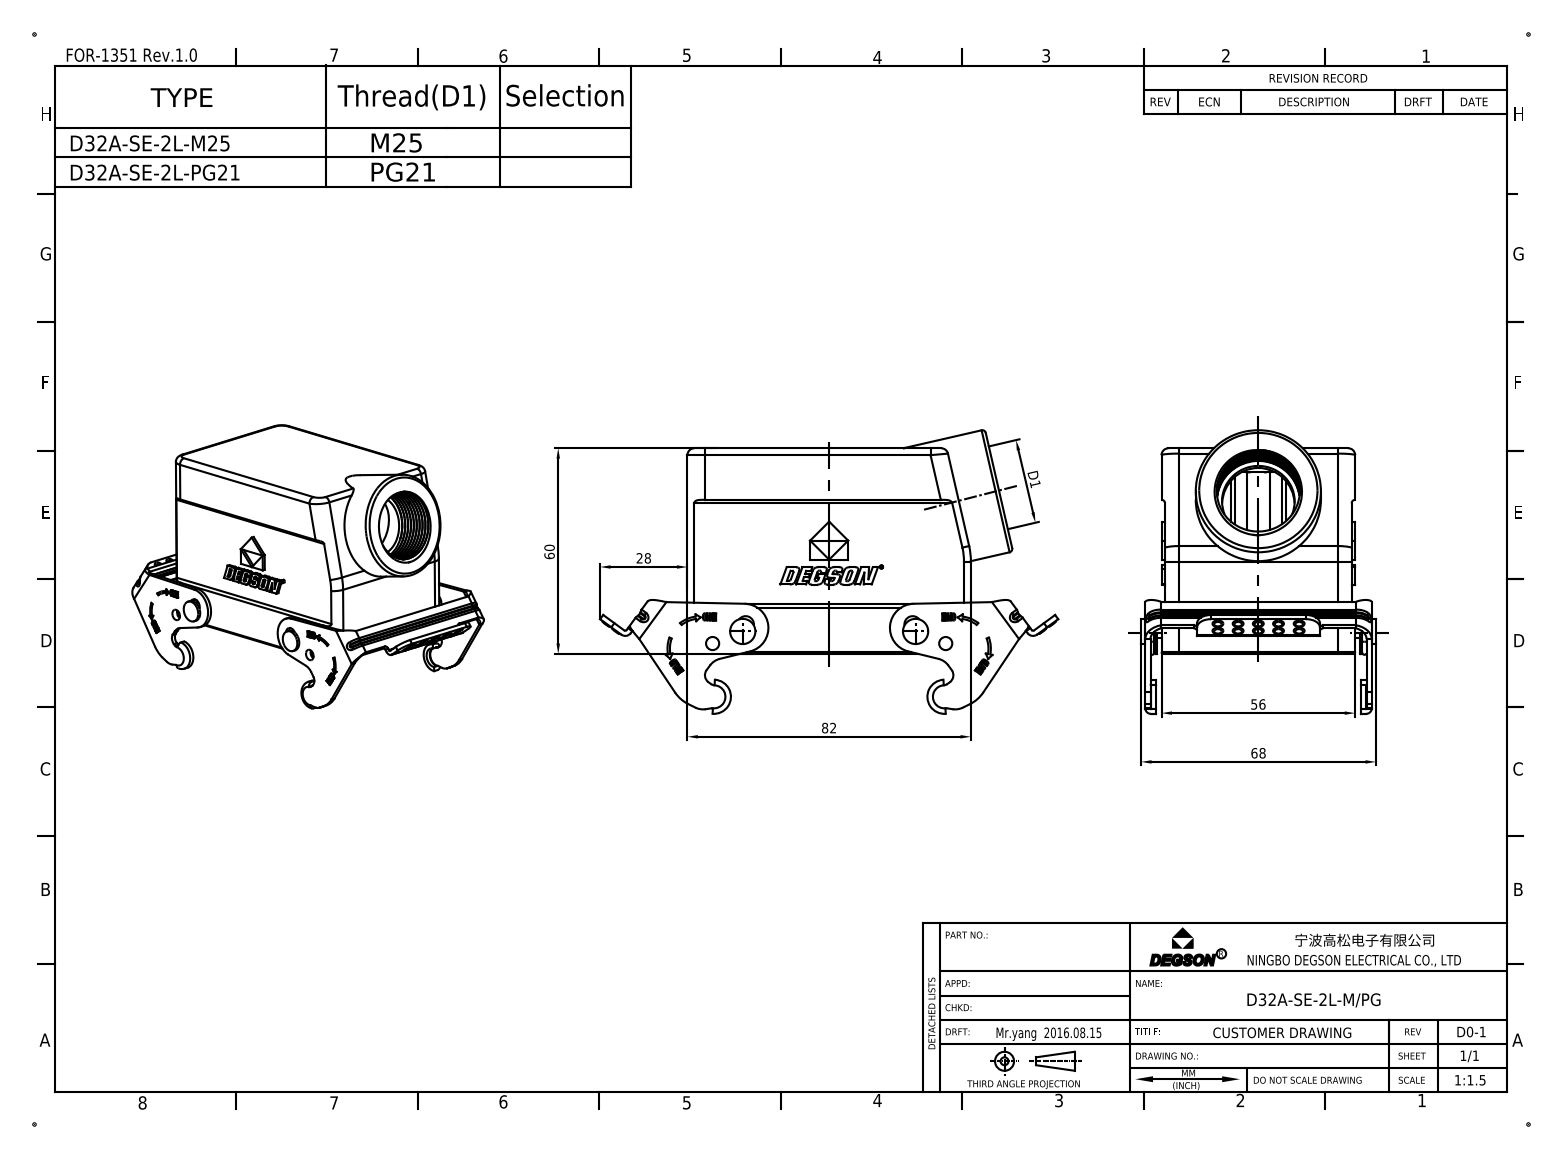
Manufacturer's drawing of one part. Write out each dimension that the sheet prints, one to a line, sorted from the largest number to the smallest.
82
68
60
56
28
D1
